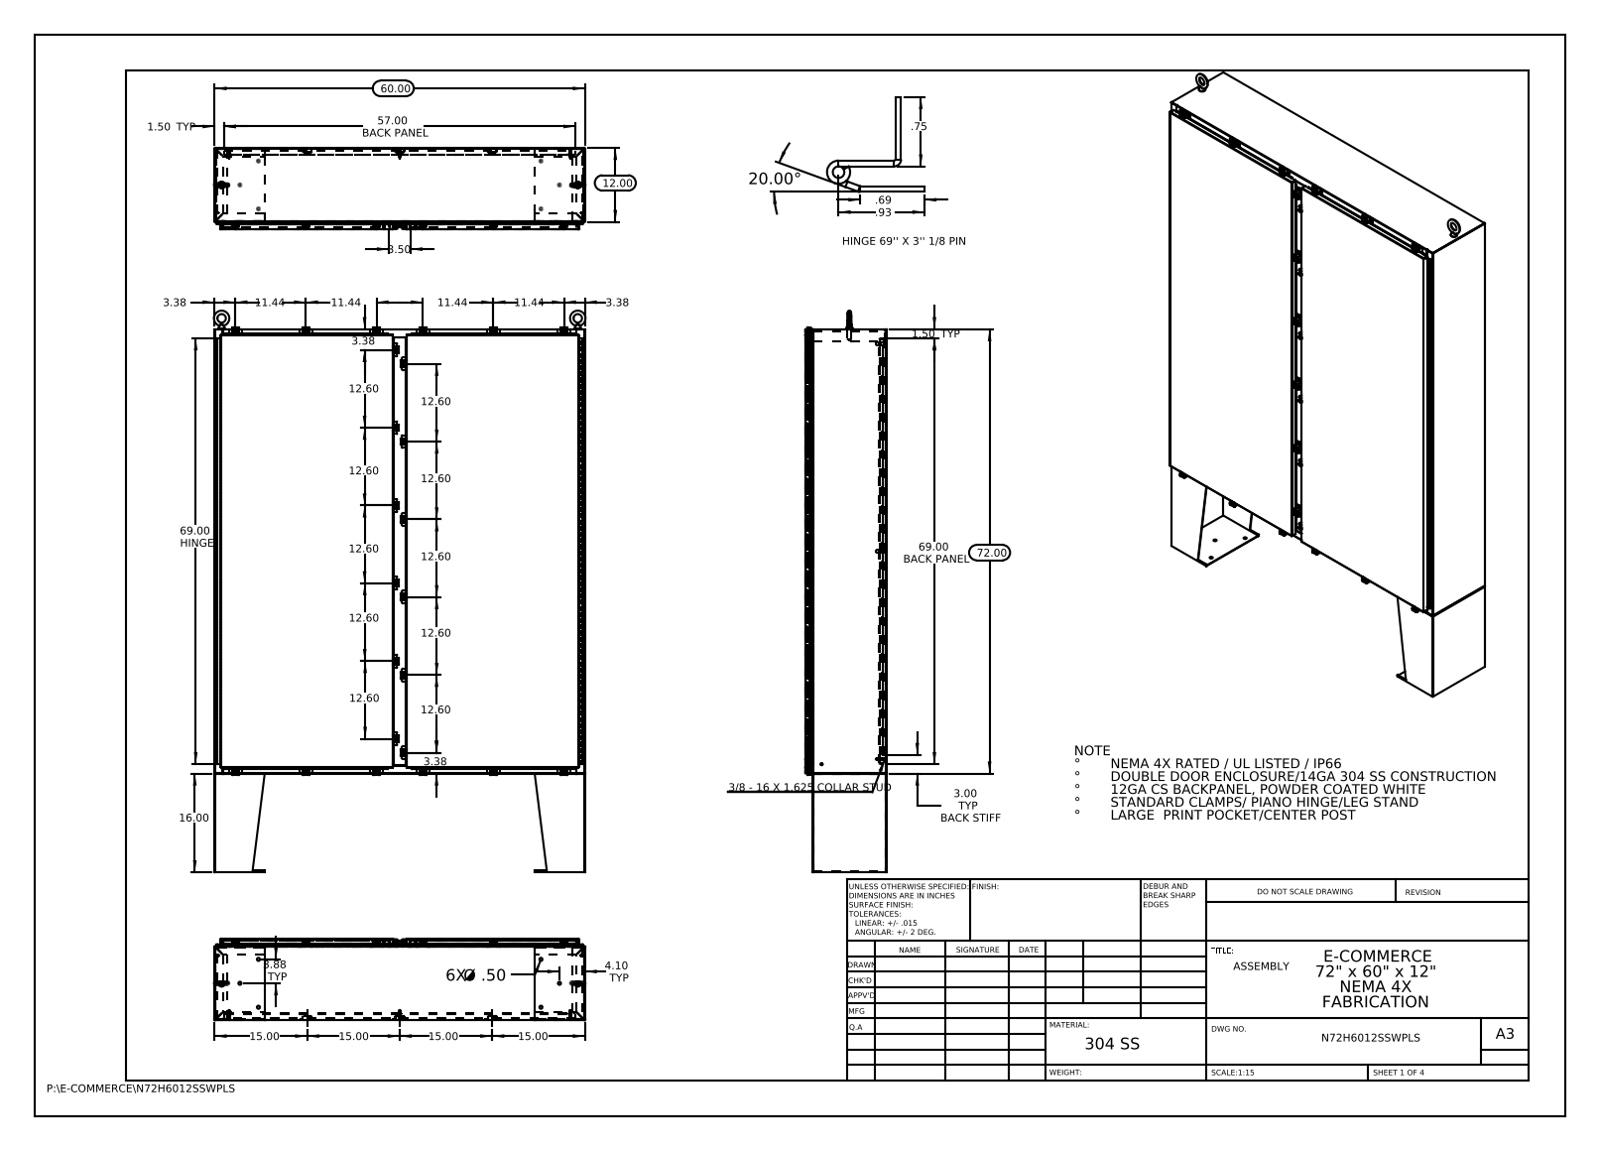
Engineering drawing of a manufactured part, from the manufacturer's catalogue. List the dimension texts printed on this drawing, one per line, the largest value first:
72.00
69.00 HINGE
69.00 BACK PANEL
60.00
57.00 BACK PANEL
20.00°
16.00
15.00
15.00
15.00
15.00
12.60
12.60
12.60
12.60
12.60
12.60
12.60
12.60
12.60
12.60
12.00
11.44
11.44
11.44
11.44
4.10 TYP
3.88 TYP
3.50
3.38
3.38
3.38
3.38
3.00 TYP BACK STIFF
1.50 TYP
1.50 TYP
.93
.75
.69
6X Ø .50
